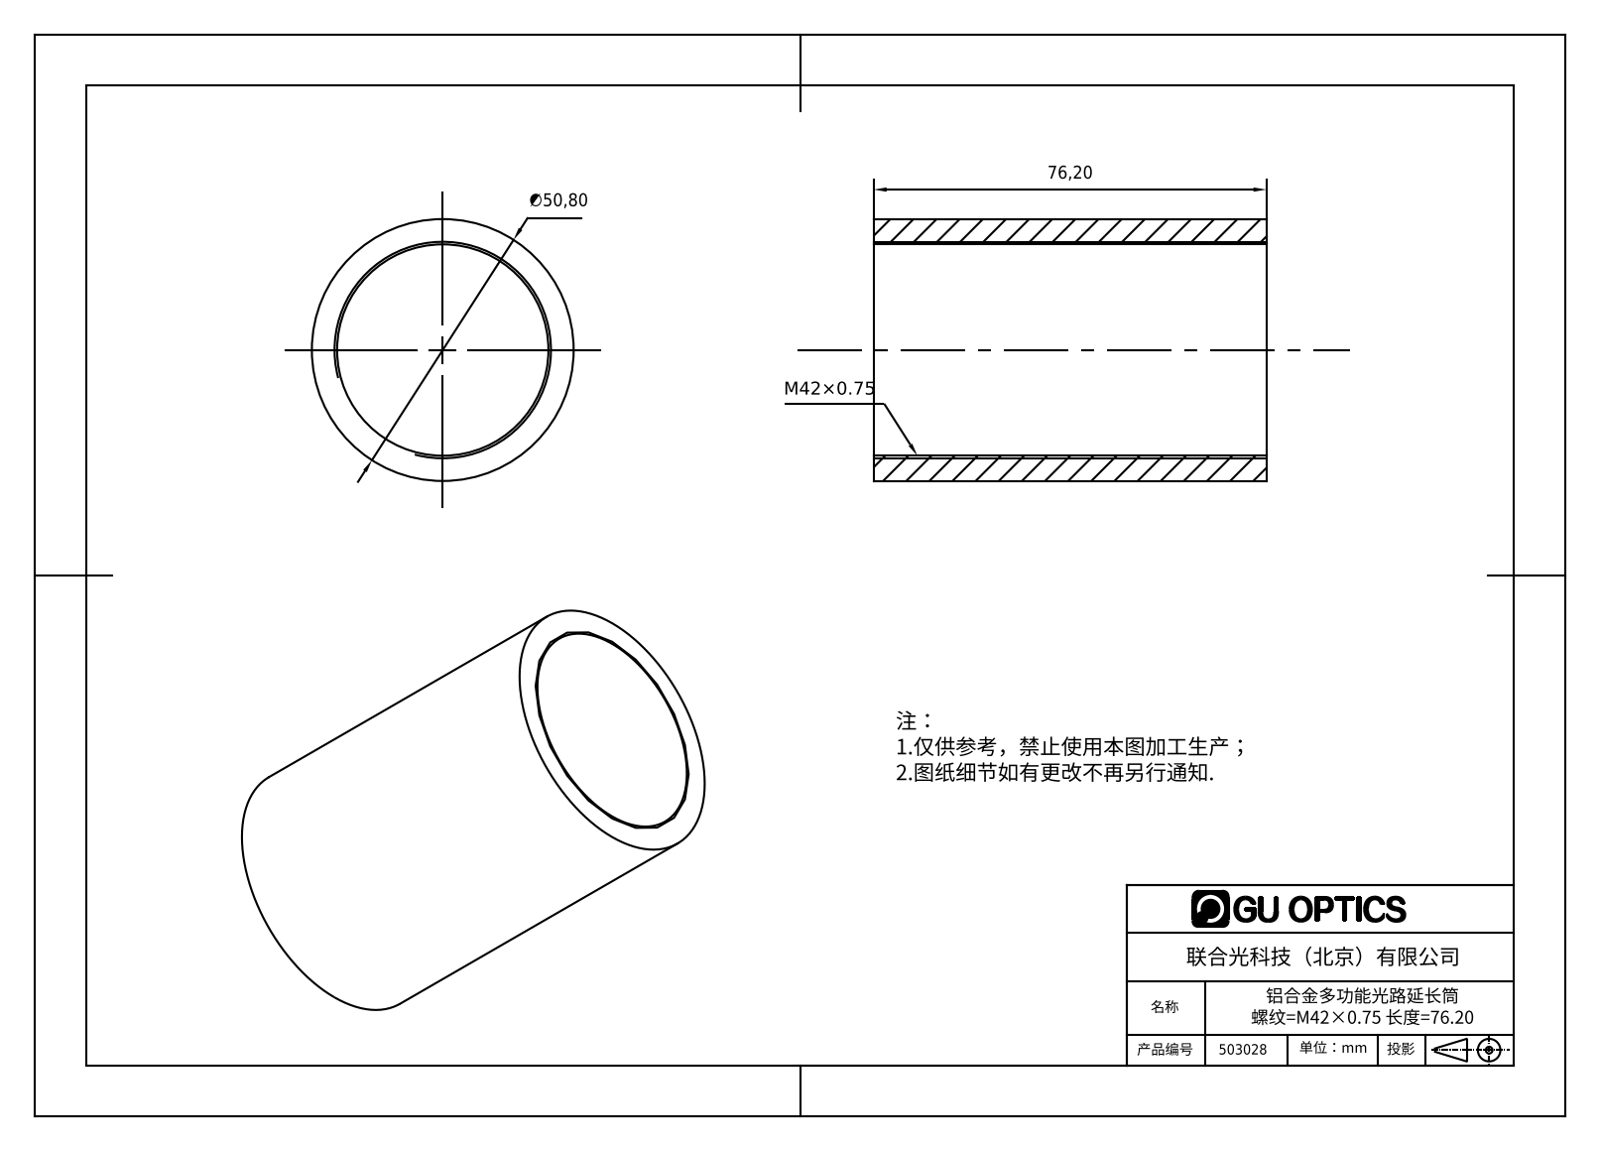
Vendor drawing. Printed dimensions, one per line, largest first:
76,20
∅50,80
